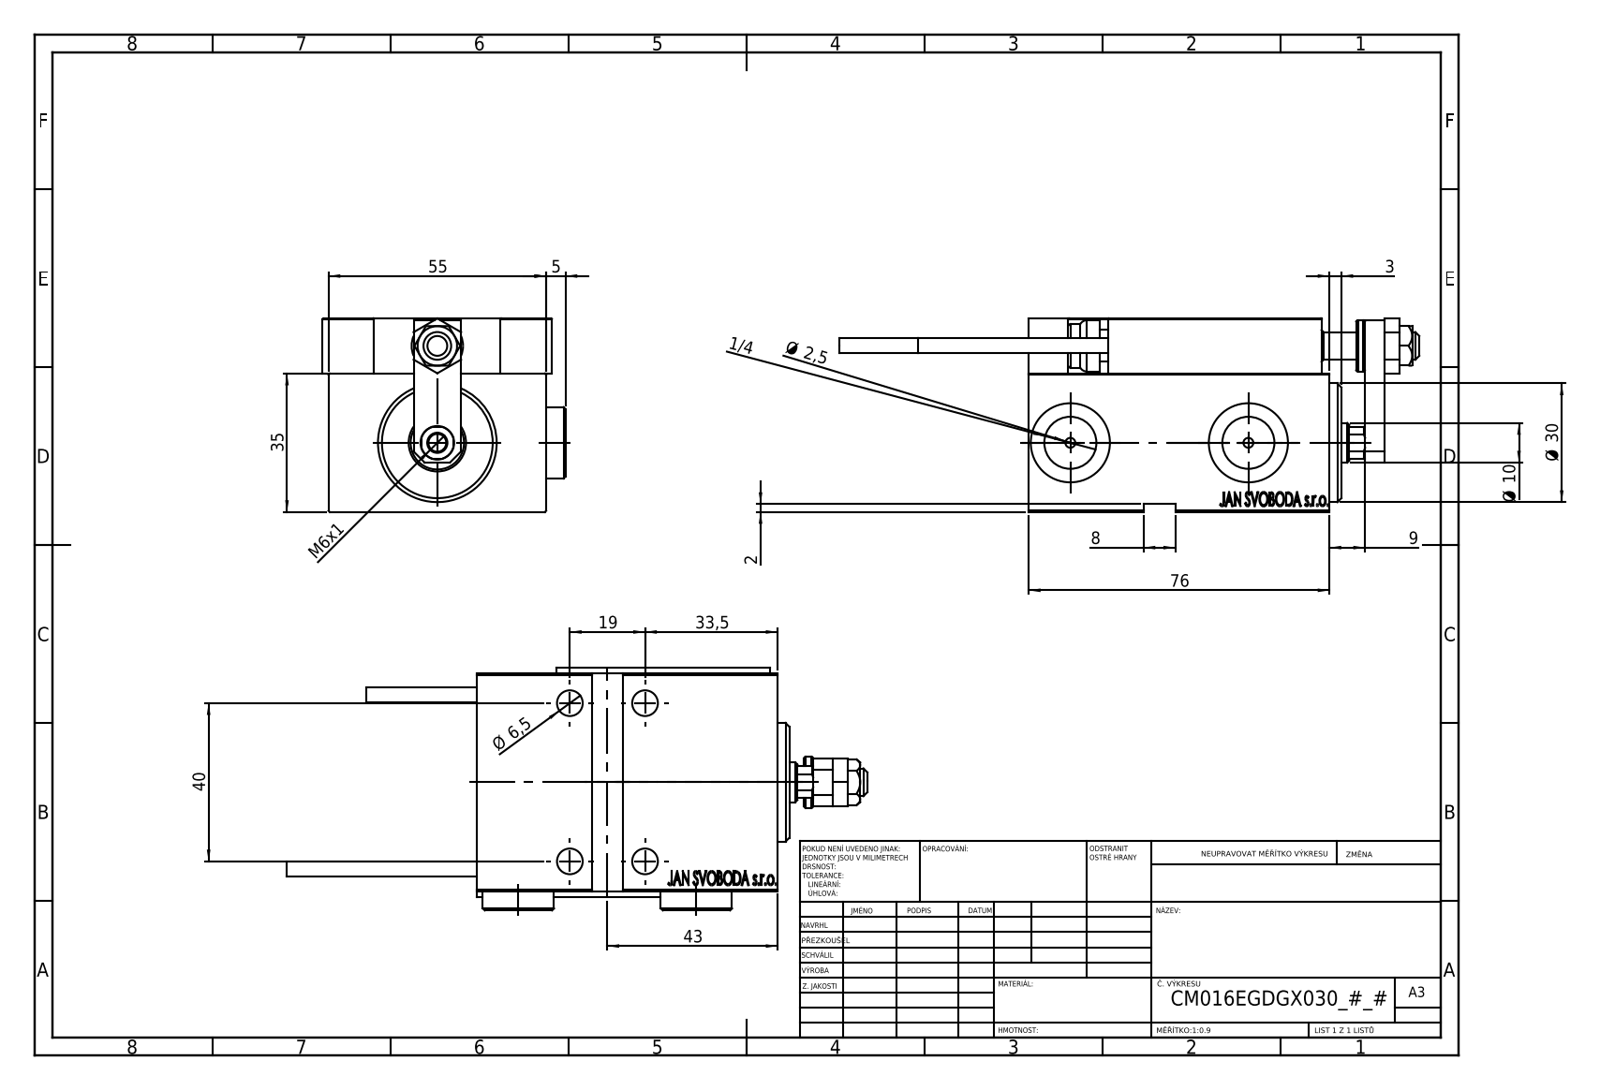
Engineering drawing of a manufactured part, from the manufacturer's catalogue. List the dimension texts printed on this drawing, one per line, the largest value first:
76
55
43
40
35
33,5
Ø 30
19
Ø 10
9
8
Ø 6,5
M6x1
5
3
Ø 2,5
2
1/4
